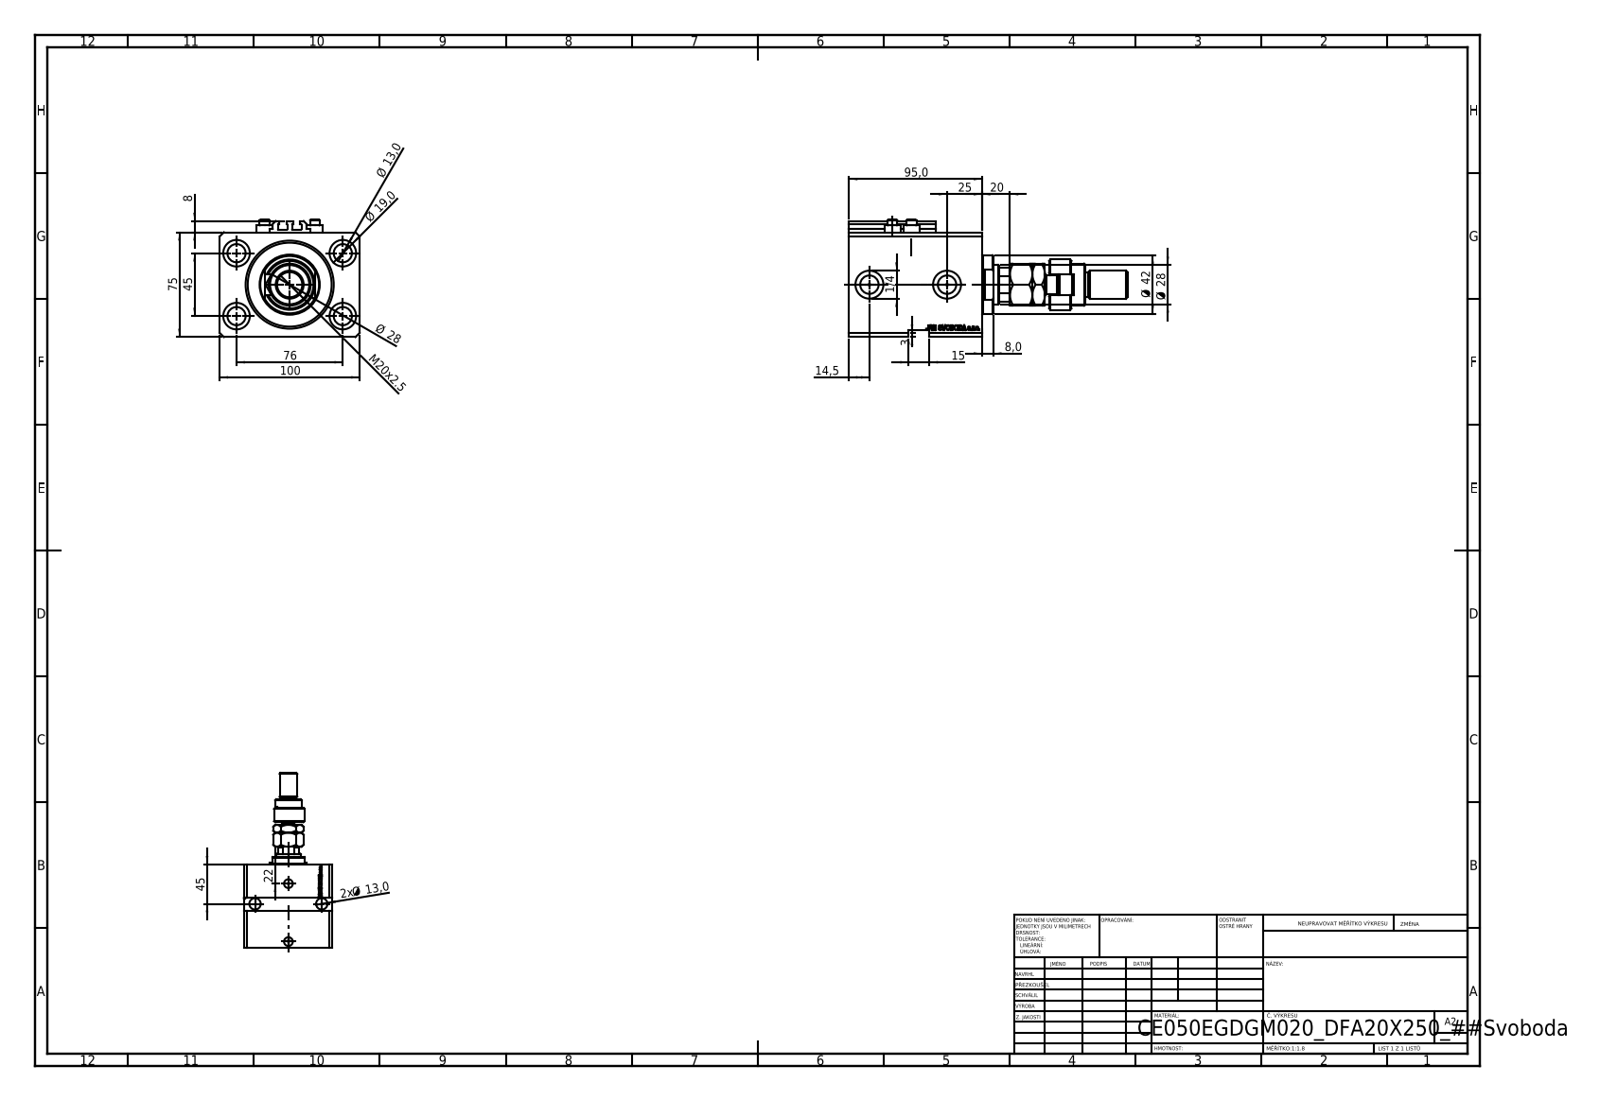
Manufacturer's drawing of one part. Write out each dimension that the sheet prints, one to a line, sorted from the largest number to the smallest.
100
95,0
76
75
45
45
Ø 42
Ø 28
Ø 28
25
22
M20x2.5
20
Ø 19,0
15
14,5
Ø 13,0
2x Ø 13,0
8
8,0
3
1/4
